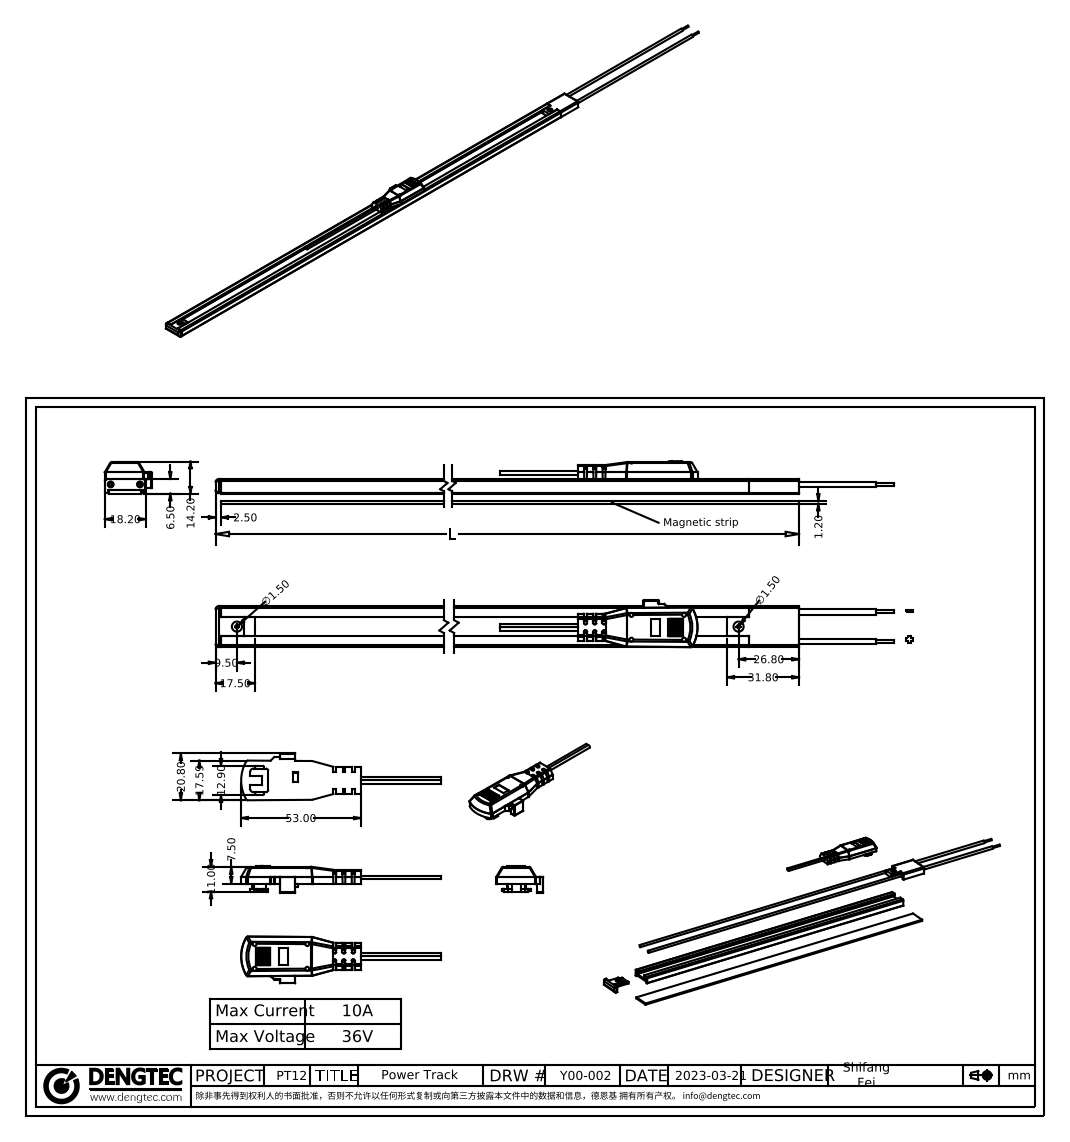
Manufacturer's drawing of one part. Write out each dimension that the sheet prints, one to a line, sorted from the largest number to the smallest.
53.00
31.80
26.80
20.80
18.20
17.59
17.50
14.20
12.90
11.00
9.50
7.50
6.50
2.50
∅1.50
∅1.50
1.20
L
